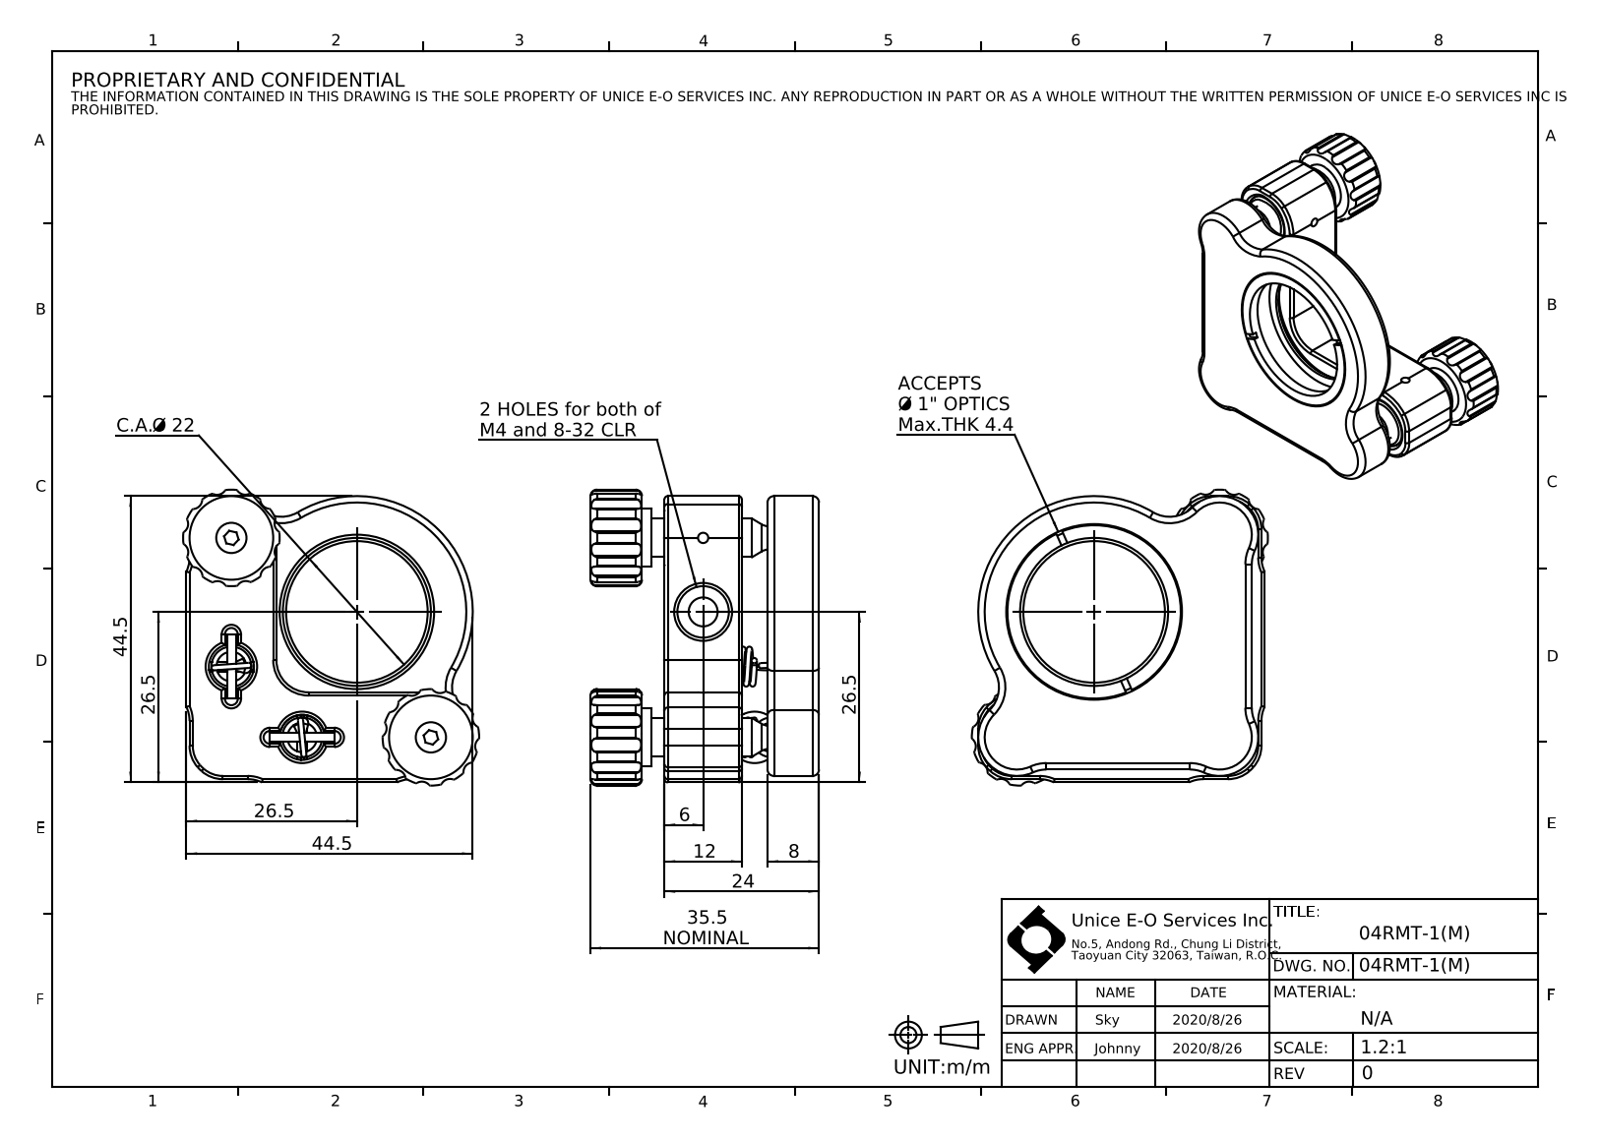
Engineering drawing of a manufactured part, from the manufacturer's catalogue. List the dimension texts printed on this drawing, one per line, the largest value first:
44.5
44.5
35.5 NOMINAL
26.5
26.5
26.5
24
C.A. Ø 22
12
8
6
2 HOLES for both of M4 and 8-32 CLR
ACCEPTS Ø 1" OPTICS Max.THK 4.4
